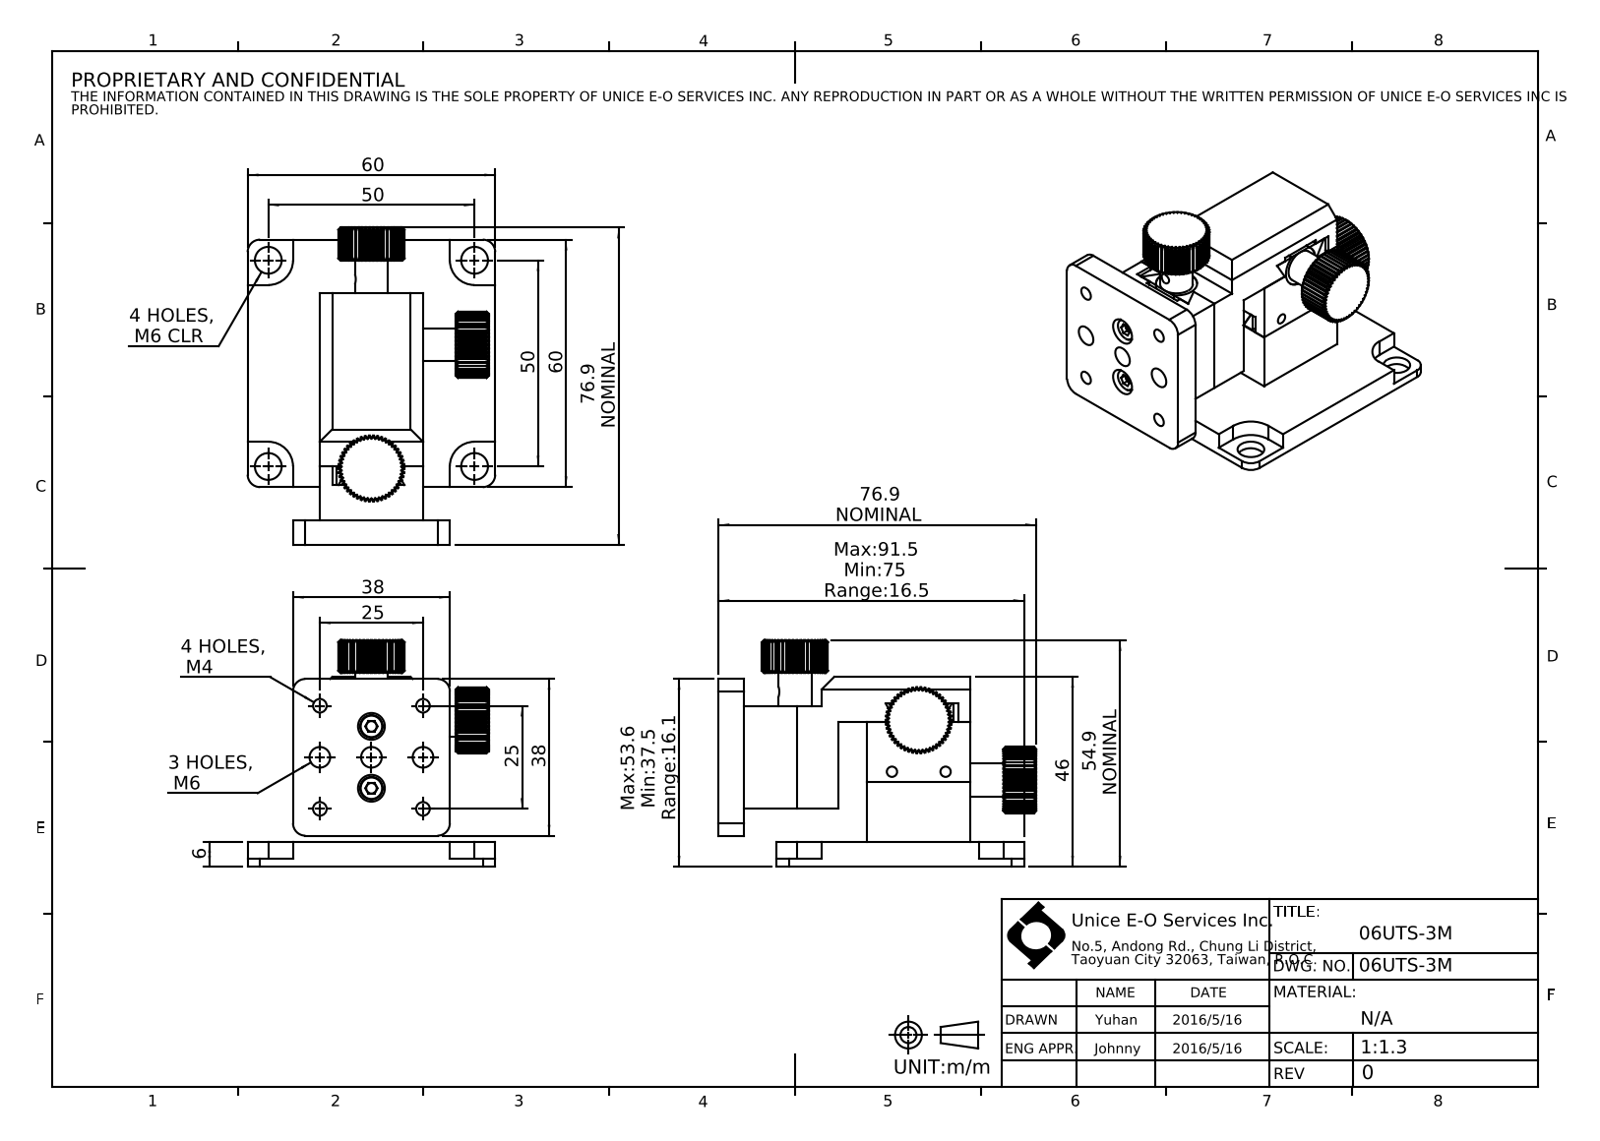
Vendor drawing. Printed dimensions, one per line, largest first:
Max:91.5 Min:75 Range:16.5
76.9 NOMINAL
76.9 NOMINAL
60
60
54.9 NOMINAL
Max:53.6 Min:37.5 Range:16.1
50
50
46
38
38
25
25
6
4 HOLES, M4
4 HOLES, M6 CLR
3 HOLES, M6
